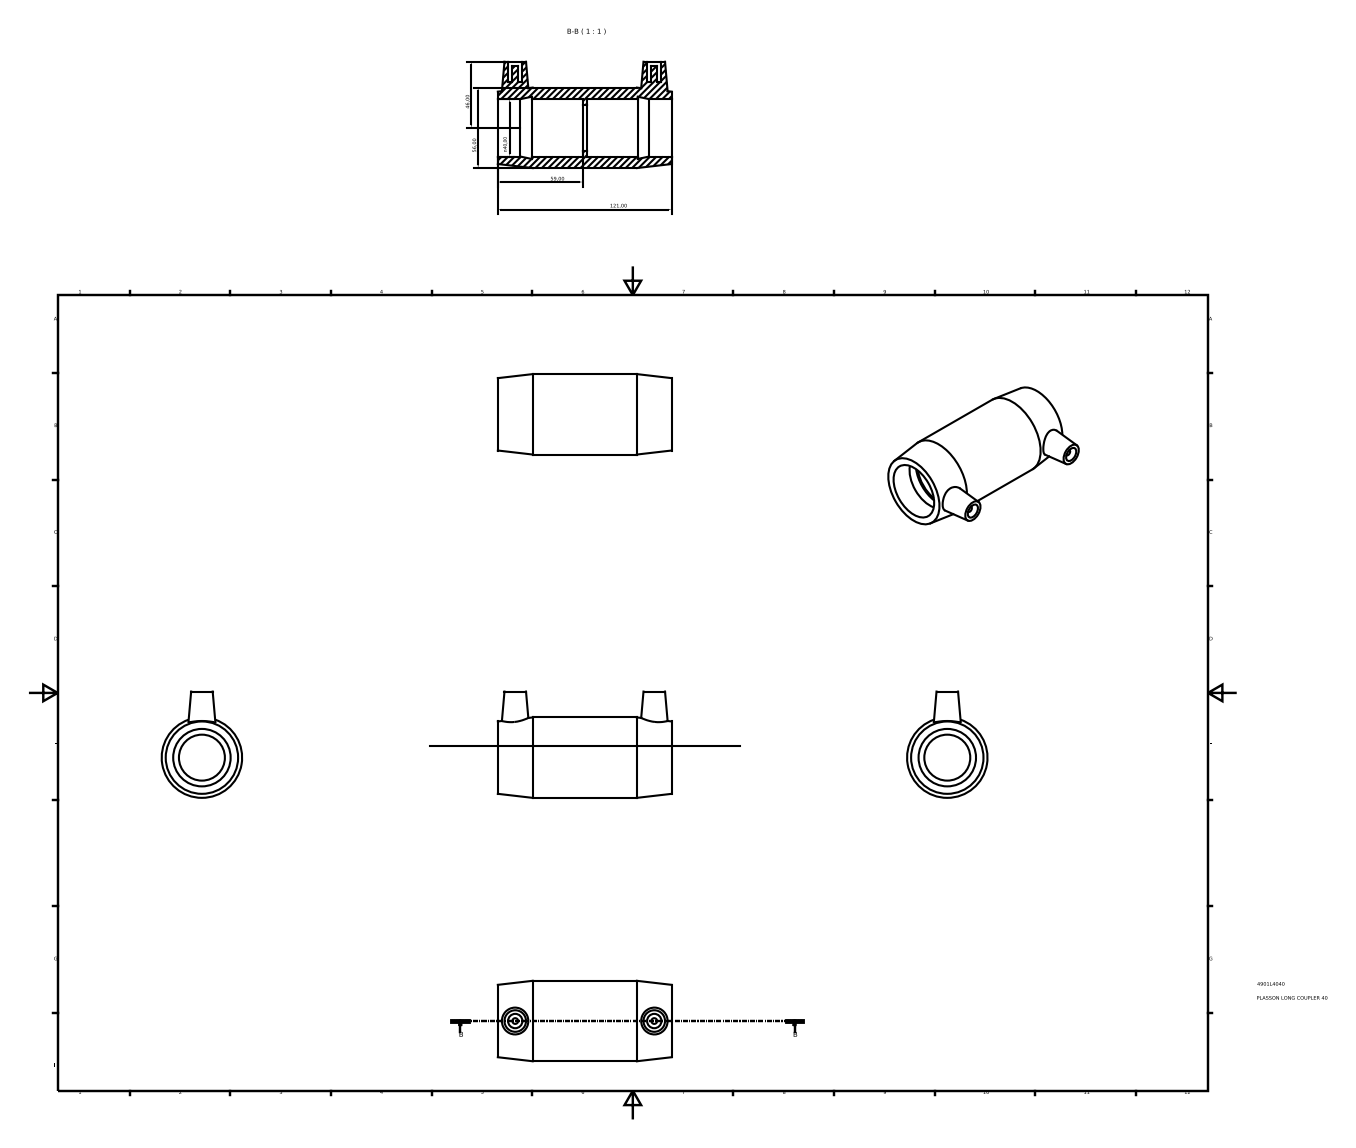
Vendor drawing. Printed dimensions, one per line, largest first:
121,00
59,00
56,00
46,00
n40,00
